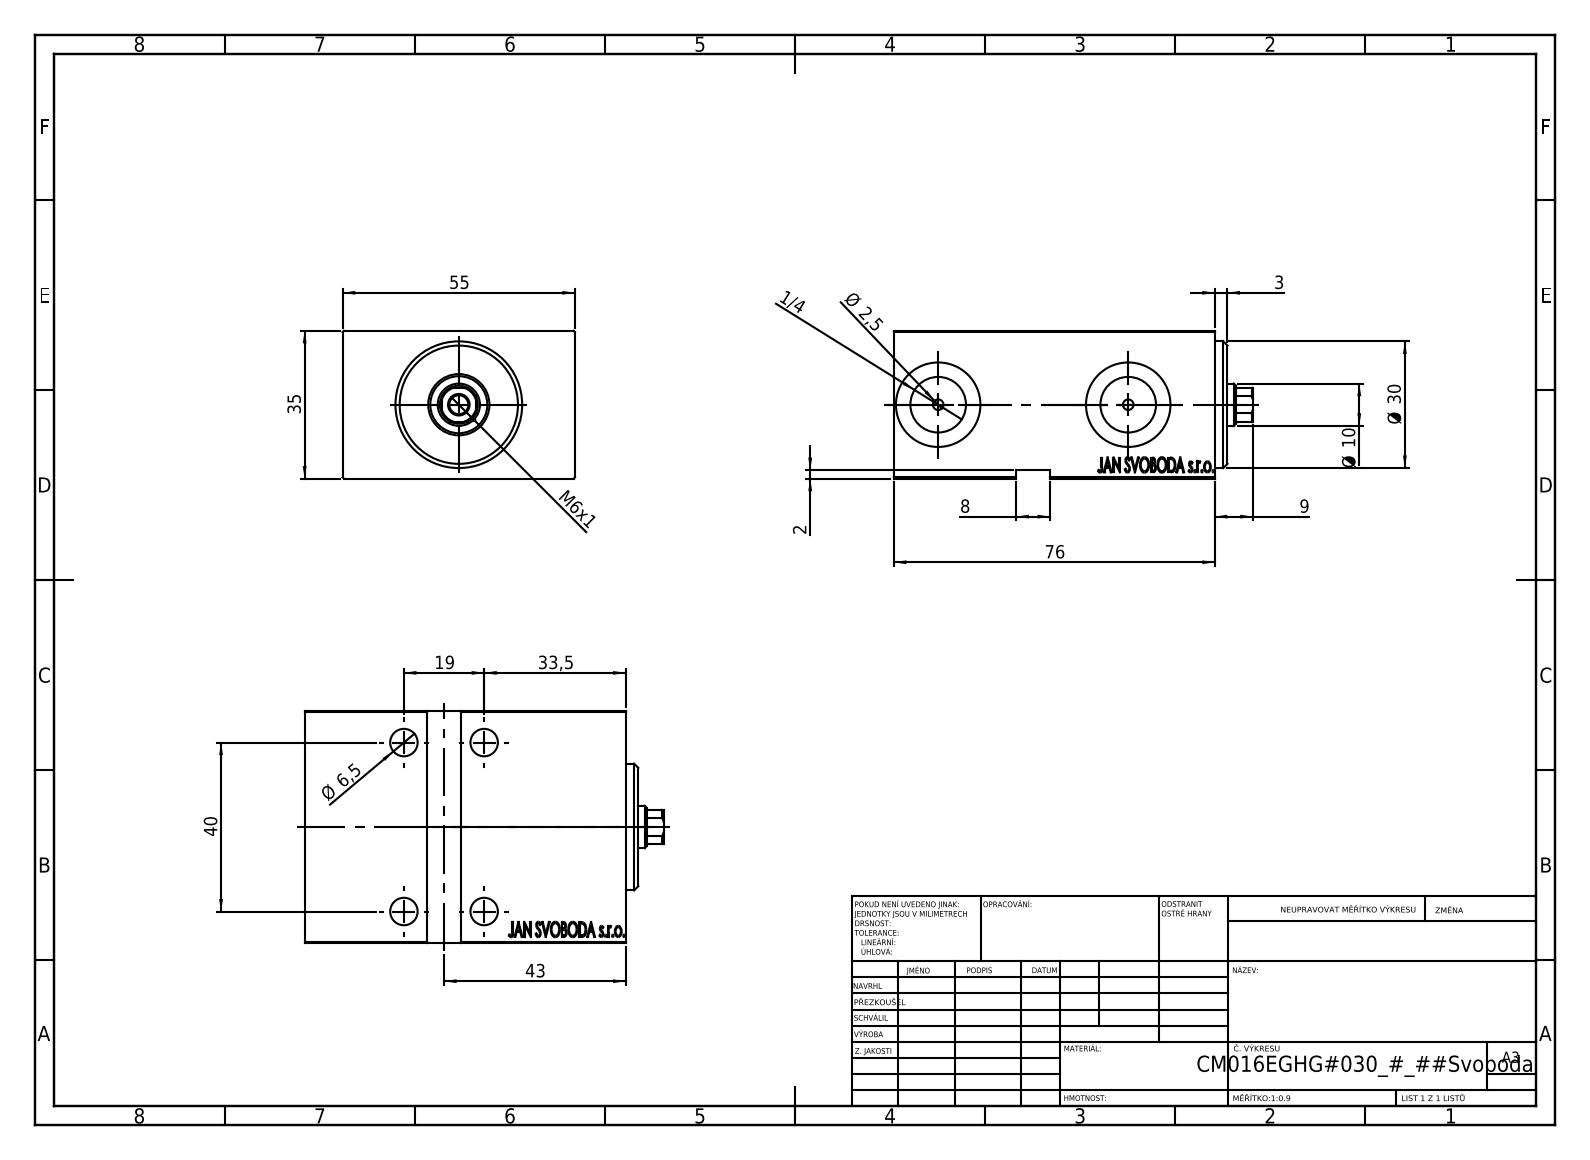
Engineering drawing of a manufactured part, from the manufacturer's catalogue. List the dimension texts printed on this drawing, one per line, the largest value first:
76
55
43
40
35
33,5
Ø 30
19
Ø 10
9
8
Ø 6,5
M6x1
3
Ø 2,5
2
1/4
